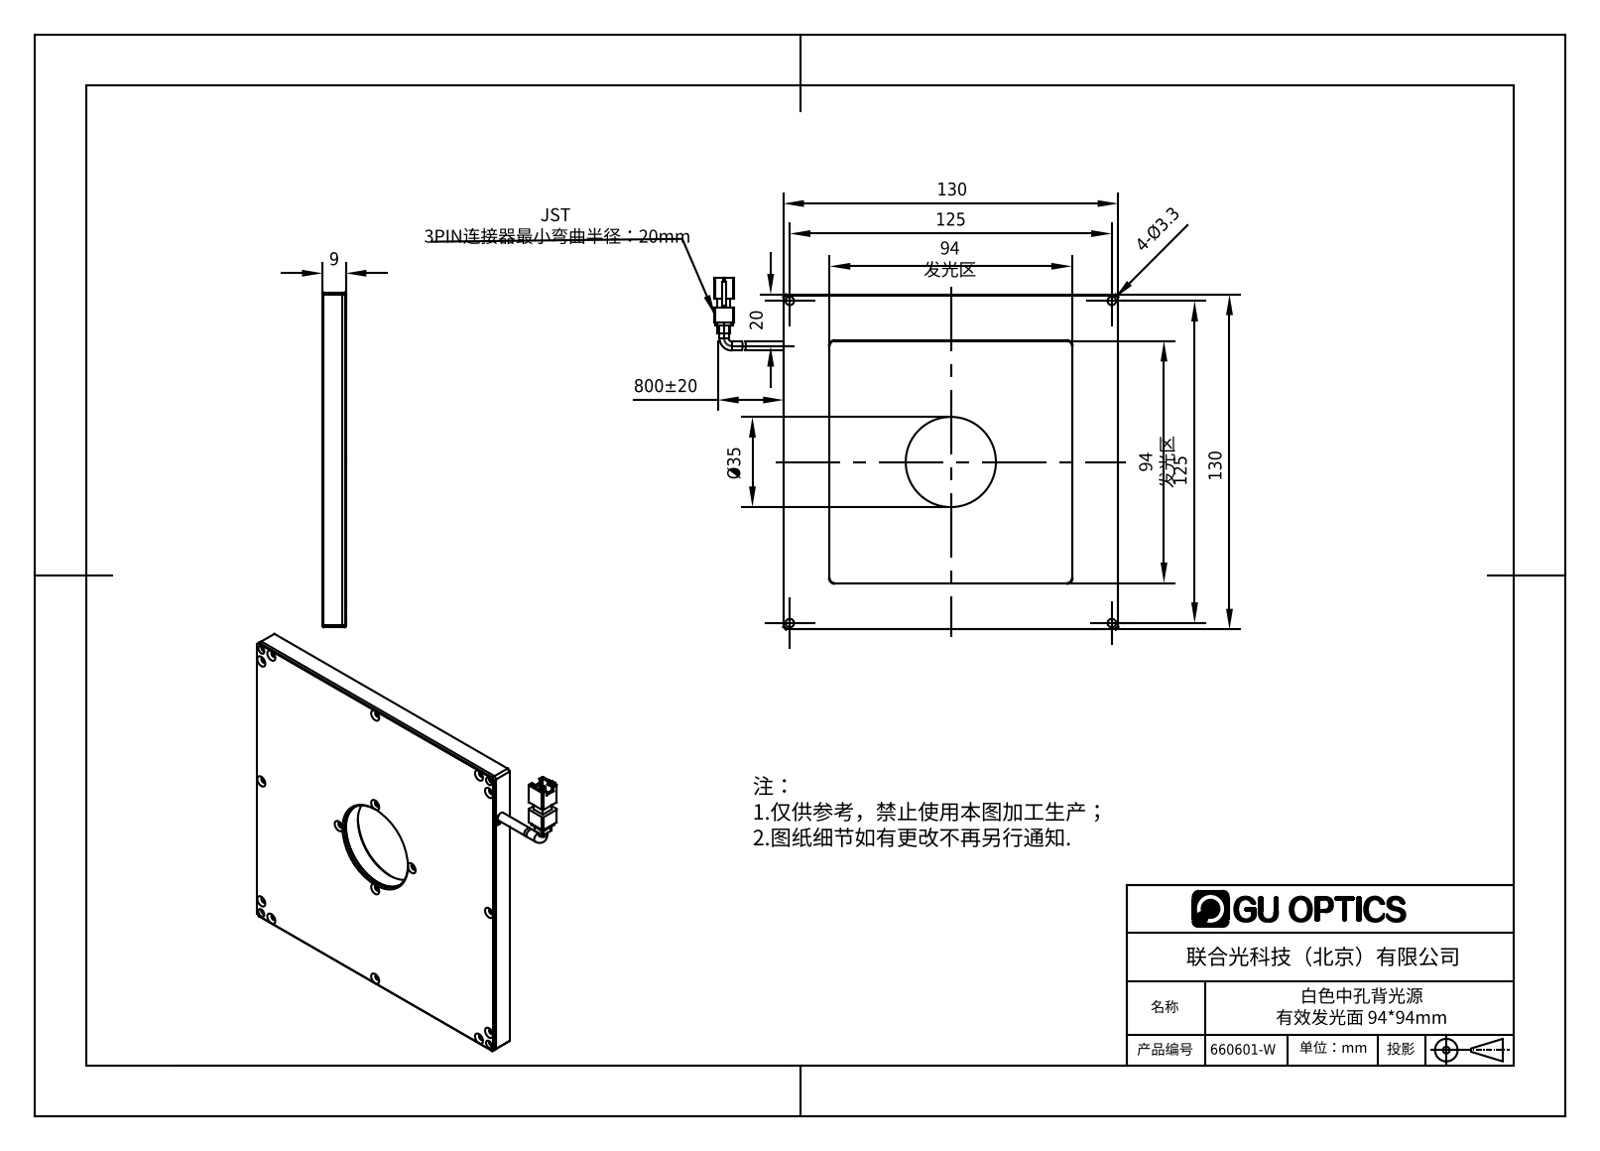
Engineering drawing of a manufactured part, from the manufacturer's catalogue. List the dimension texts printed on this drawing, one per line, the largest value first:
800±20
130
130
125
125
94 发光区
94 发光区
Ø35
20
9
4-Ø3.3
